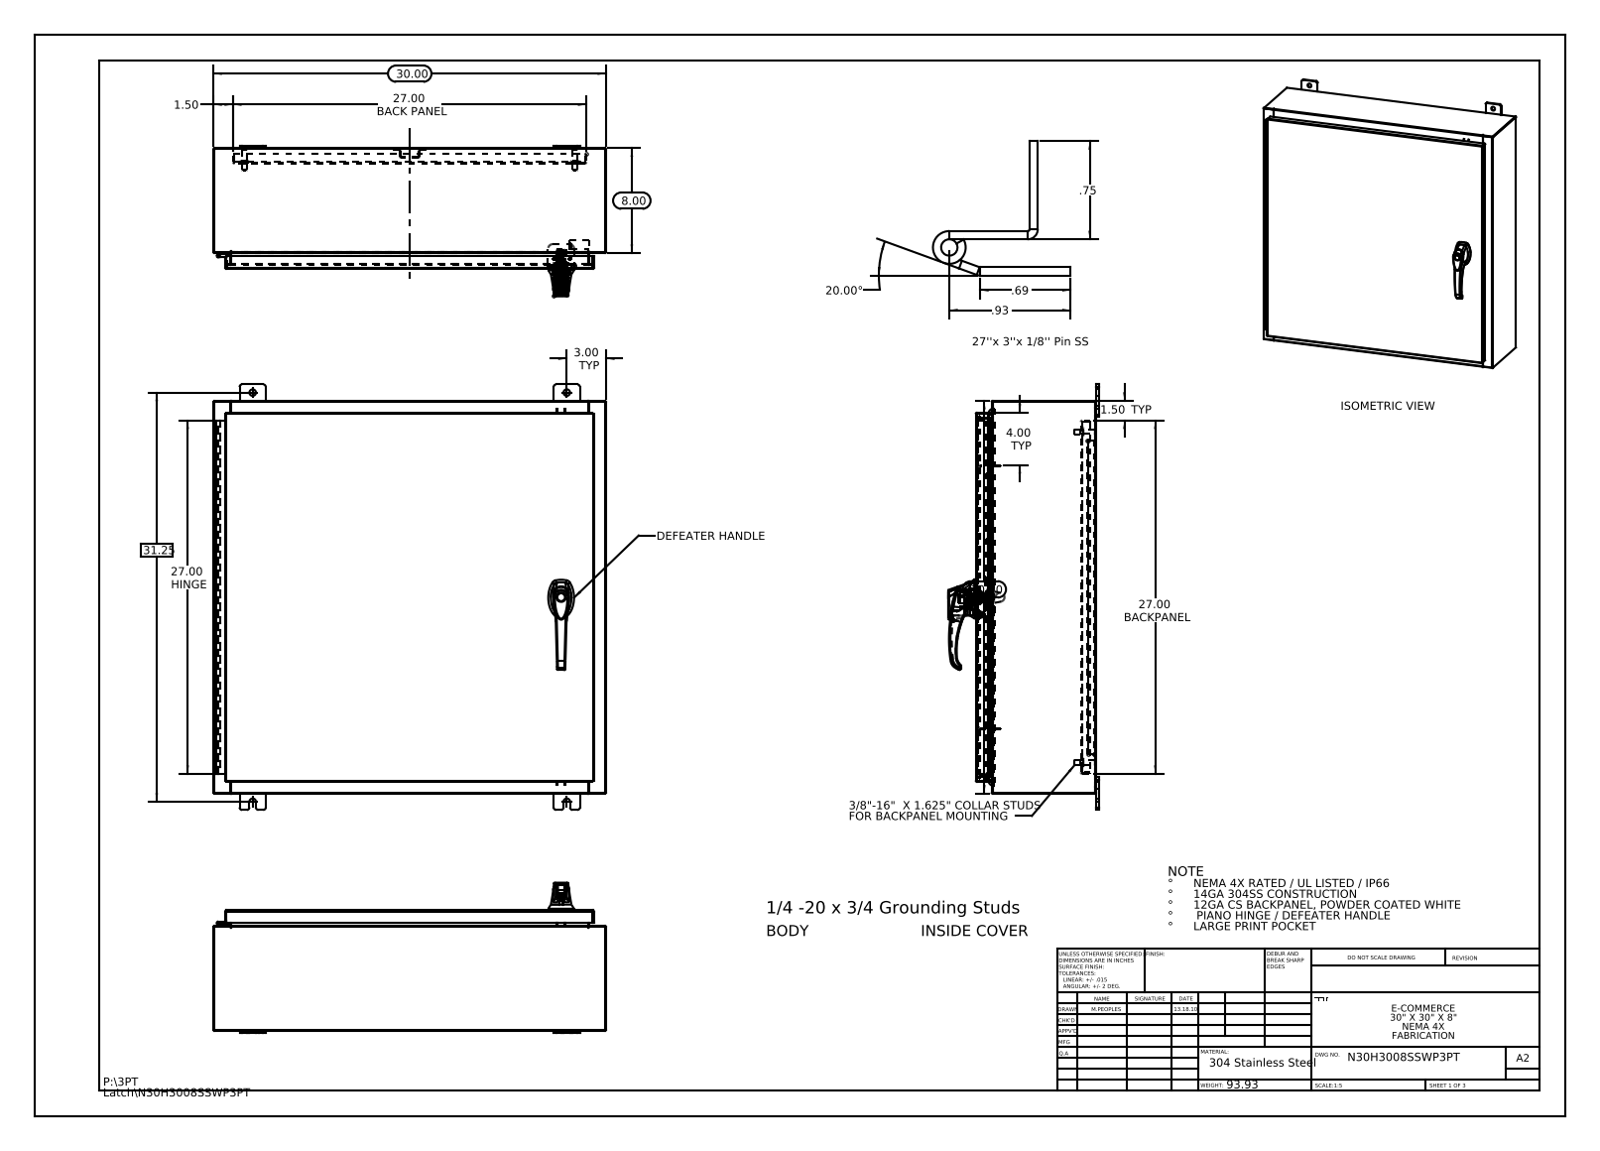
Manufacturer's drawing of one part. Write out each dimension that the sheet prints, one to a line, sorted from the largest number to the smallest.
31.25
30.00
30.00
27.00 HINGE
27.00 BACK PANEL
27.00 BACKPANEL
20.00°
8.00
4.00 TYP
3.00 TYP
1.50
1.50 TYP
.93
.75
.69
